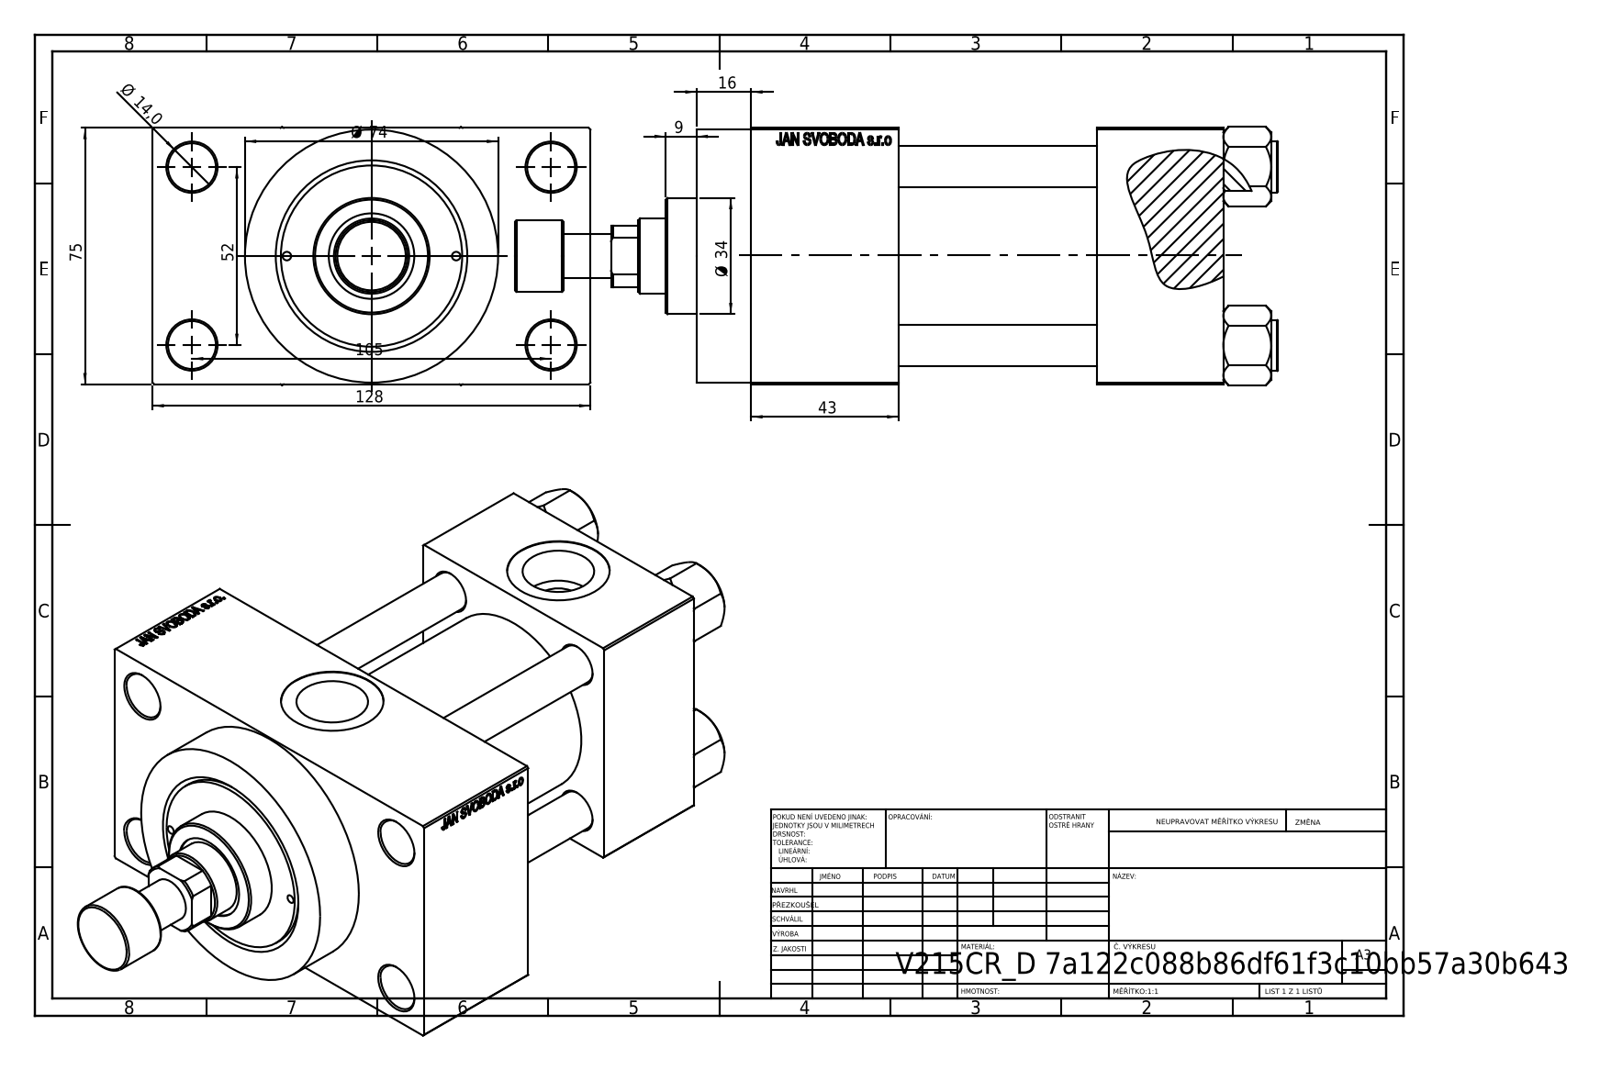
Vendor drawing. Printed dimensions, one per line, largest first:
128
105
75
Ø 74
52
43
Ø 34
16
Ø 14,0
9
